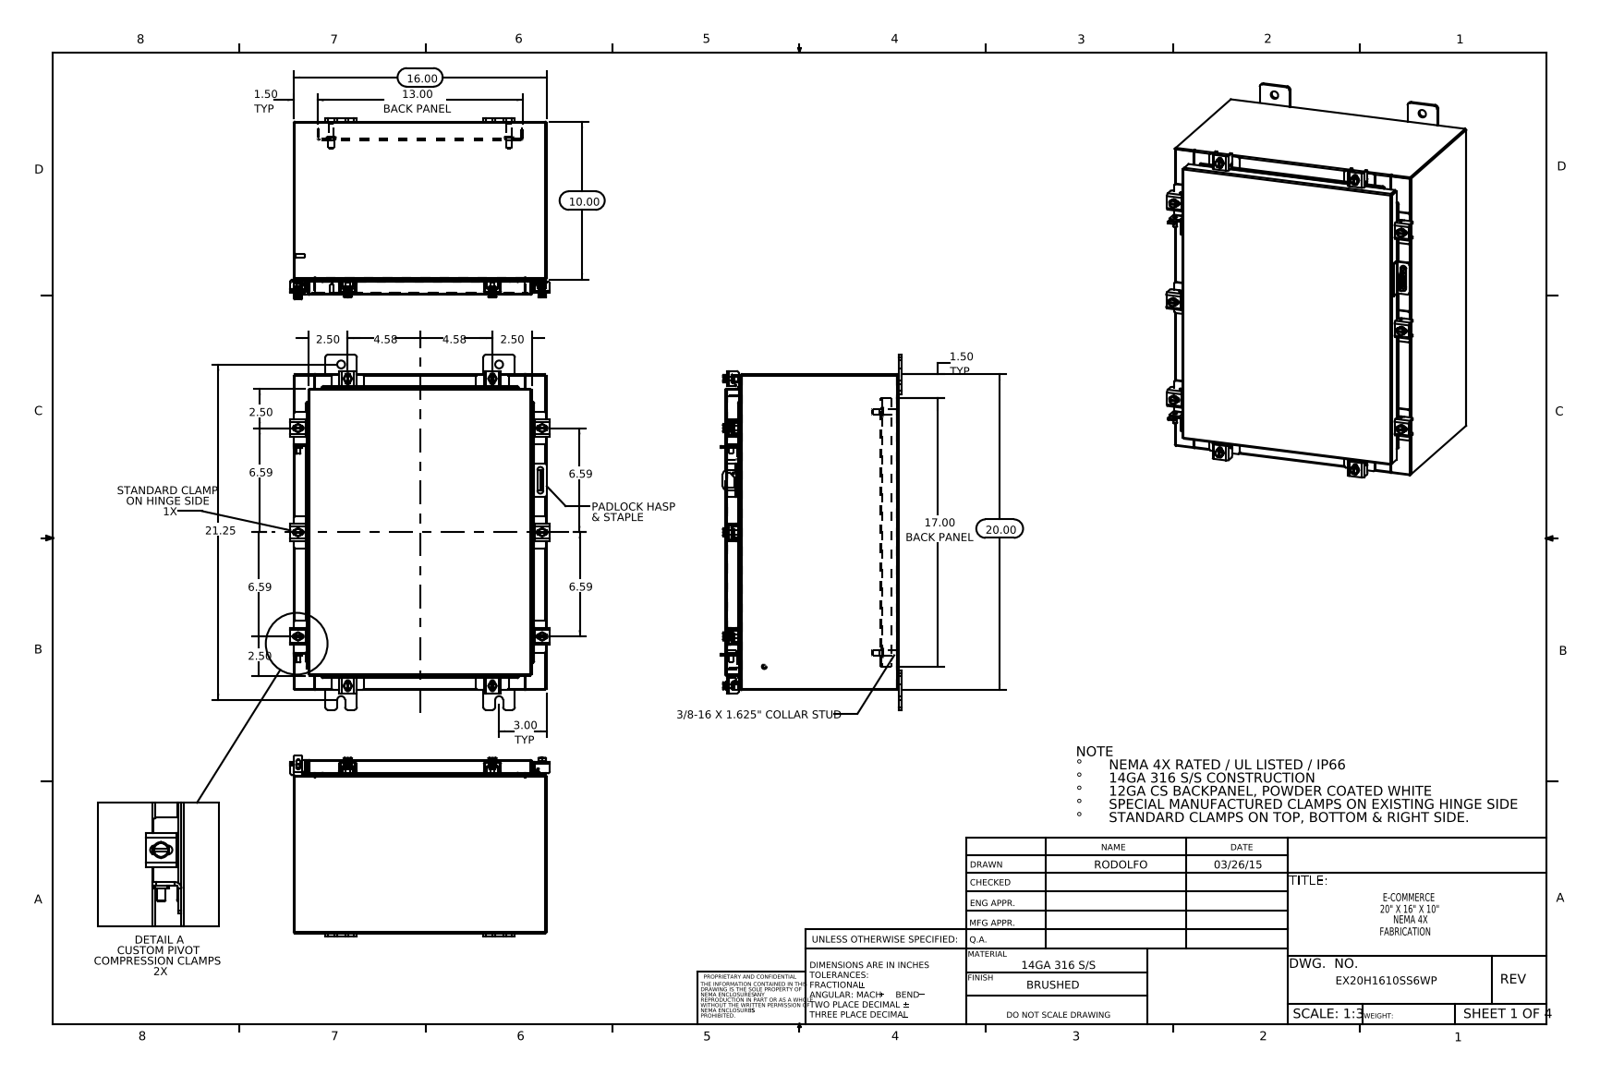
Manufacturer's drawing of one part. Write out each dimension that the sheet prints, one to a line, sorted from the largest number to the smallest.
21.25
20.00
17.00 BACK PANEL
16.00
13.00 BACK PANEL
10.00
6.59
6.59
6.59
6.59
4.58
4.58
3.00 TYP
2.50
2.50
2.50
2.50
1.50 TYP
1.50 TYP
